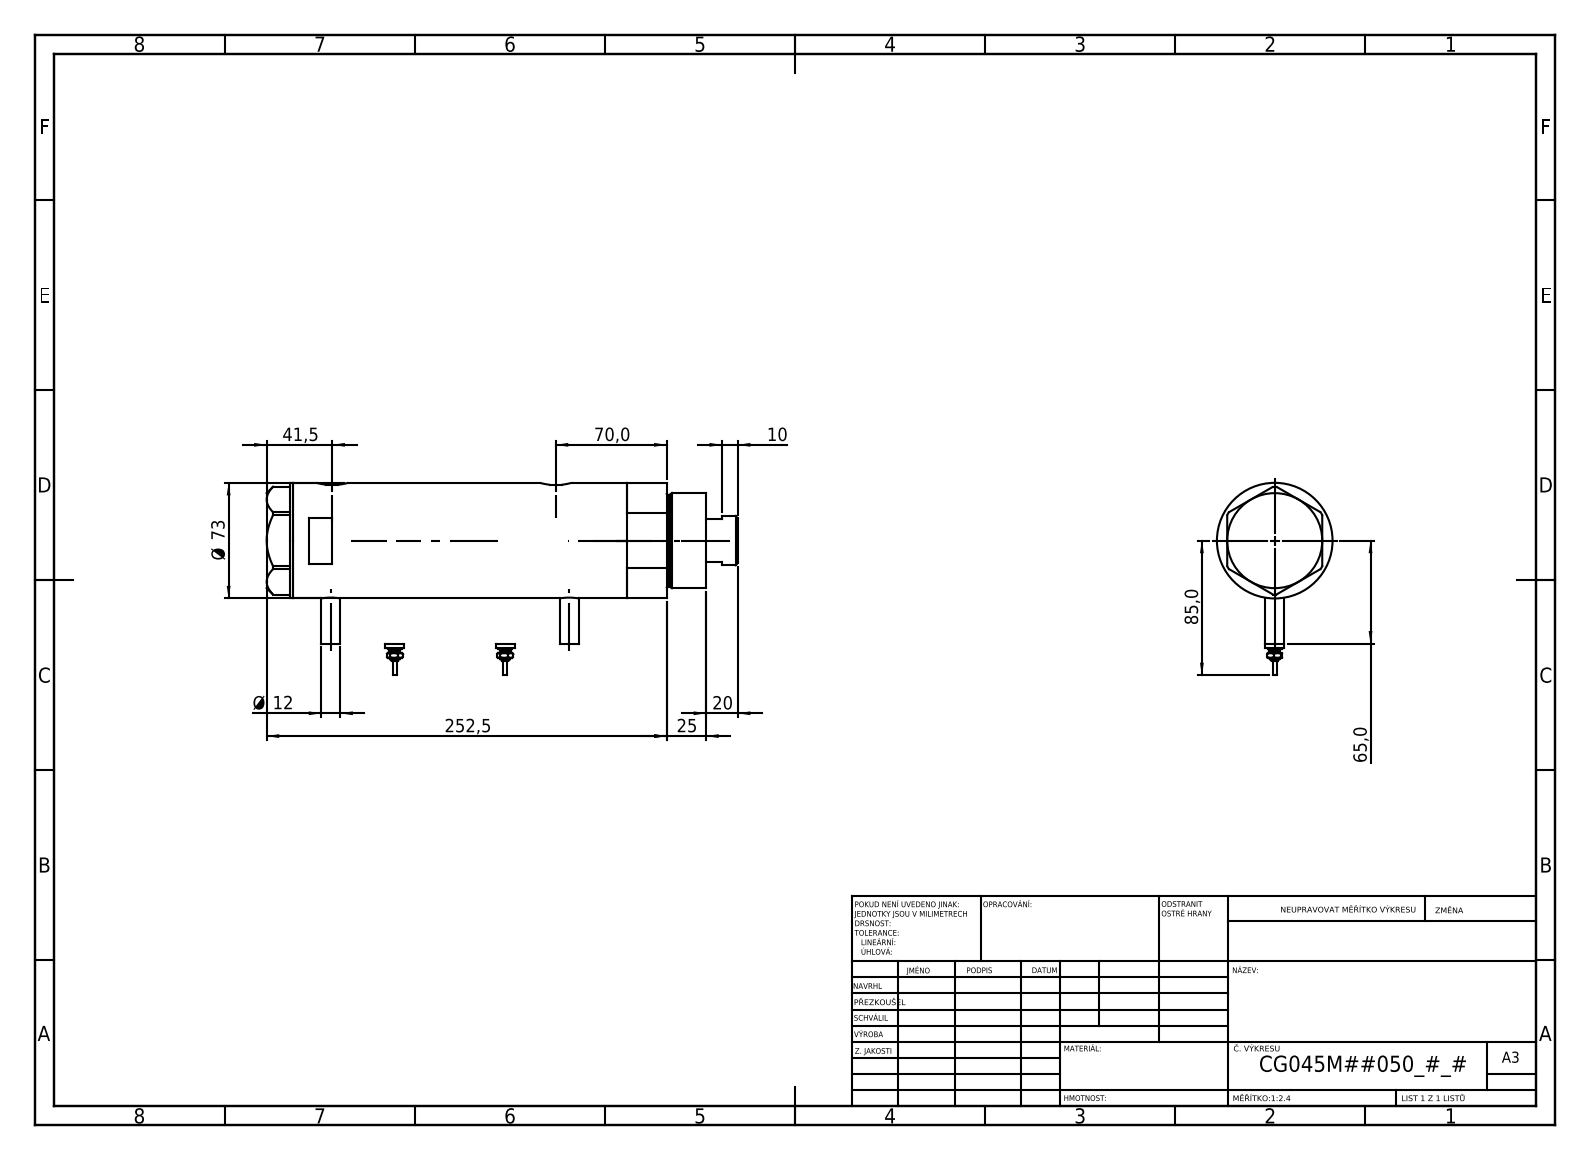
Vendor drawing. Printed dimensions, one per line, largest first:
252,5
85,0
Ø 73
70,0
65,0
41,5
25
20
Ø 12
10
